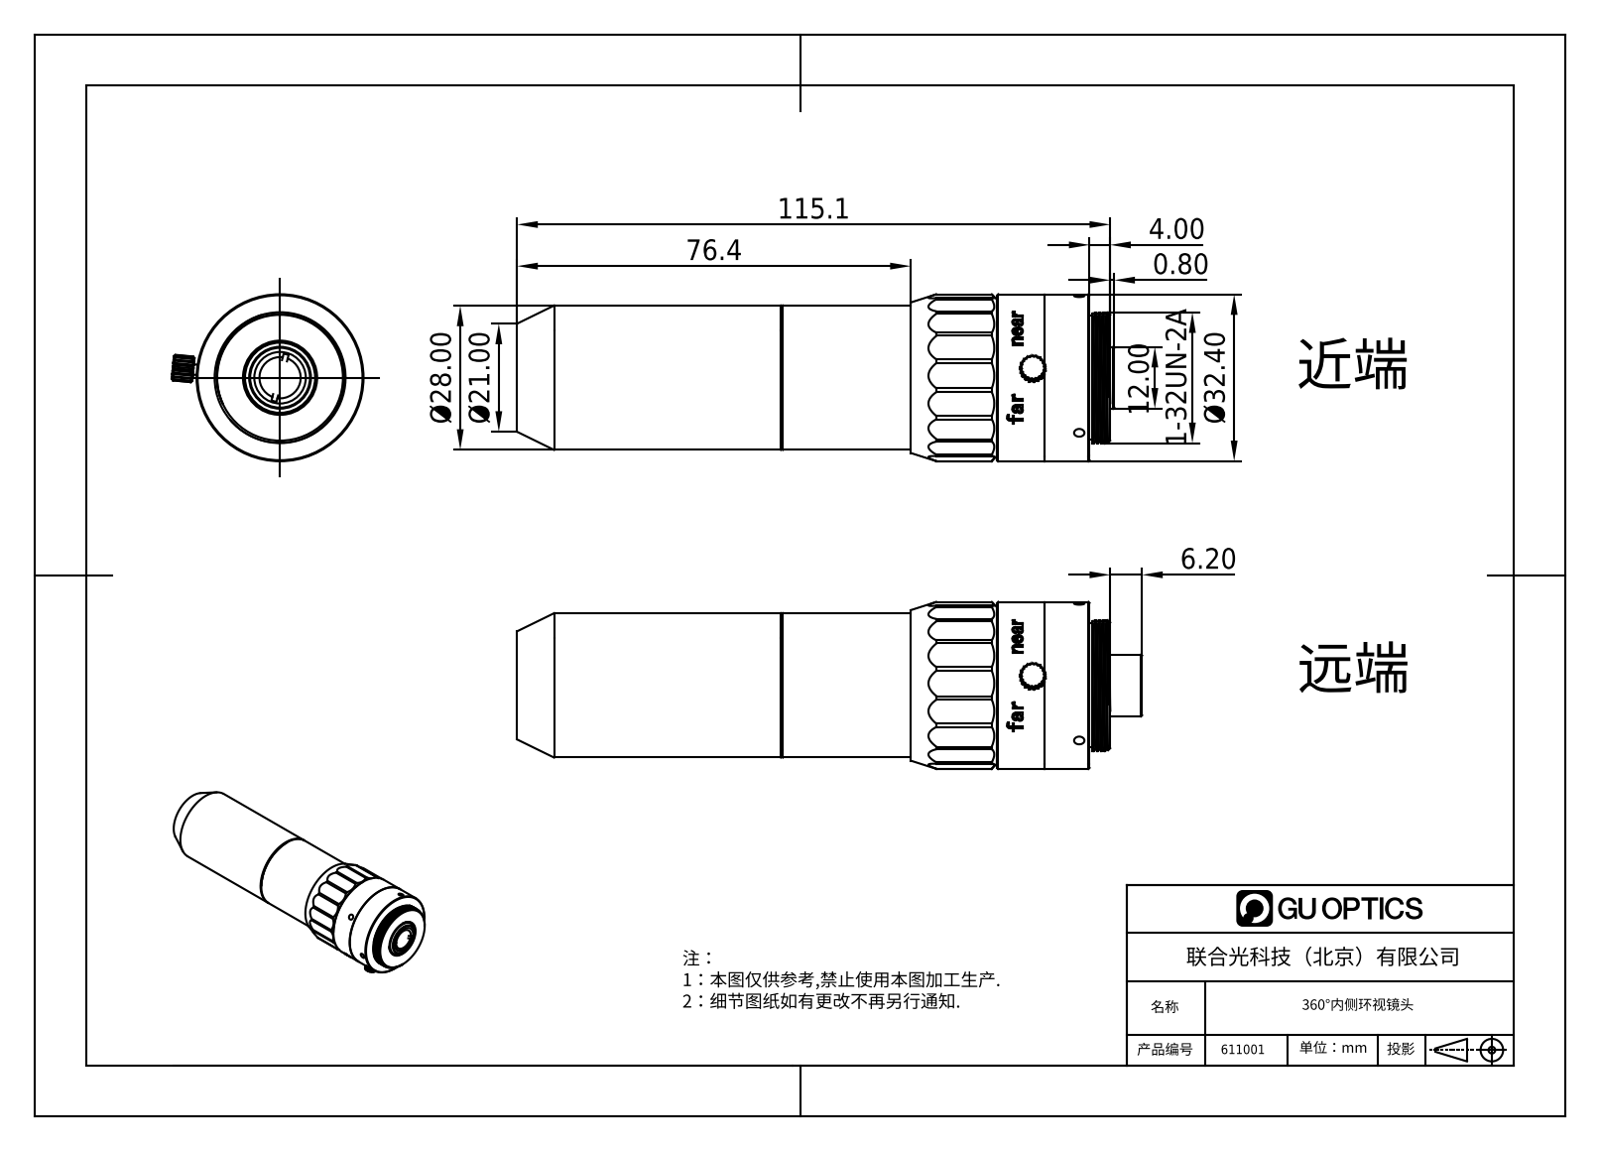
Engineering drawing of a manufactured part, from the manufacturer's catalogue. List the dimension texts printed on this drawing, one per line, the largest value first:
115.1
76.4
Ø32.40
Ø28.00
Ø21.00
12.00
6.20
4.00
1-32UN-2A
0.80
